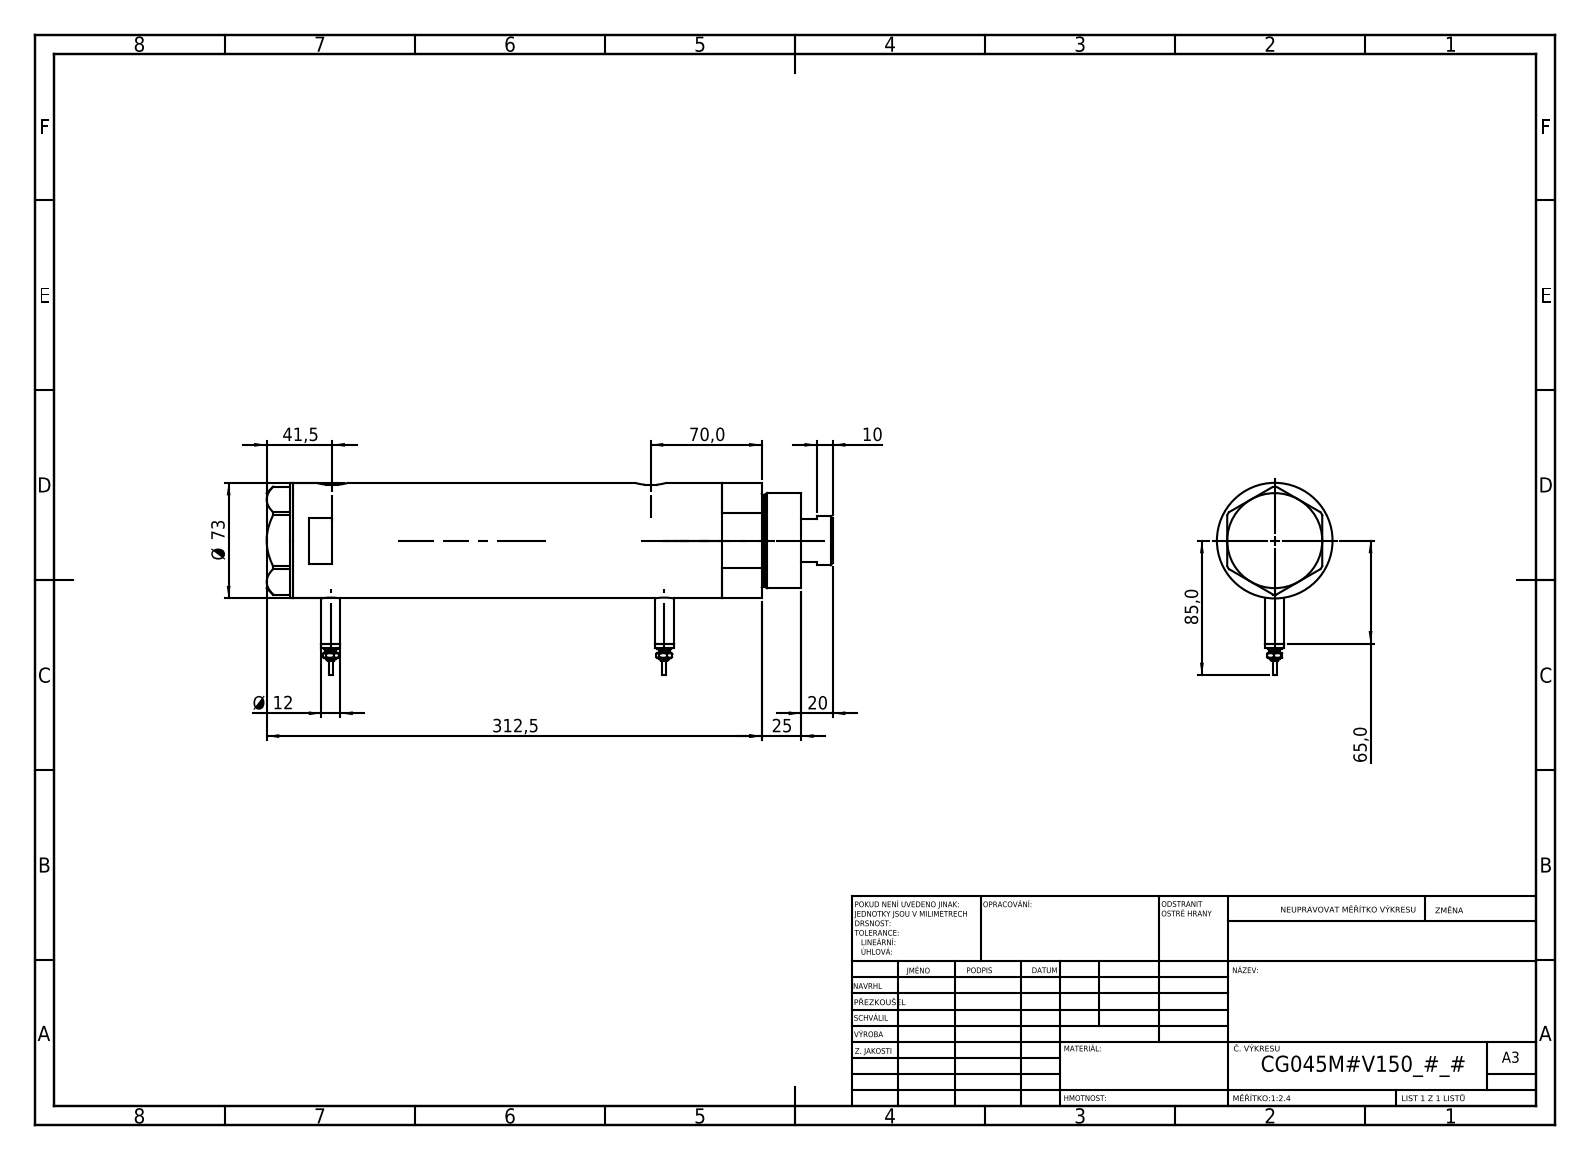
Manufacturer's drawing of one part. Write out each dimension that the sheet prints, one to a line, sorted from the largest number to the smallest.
312,5
85,0
Ø 73
70,0
65,0
41,5
25
20
Ø 12
10
